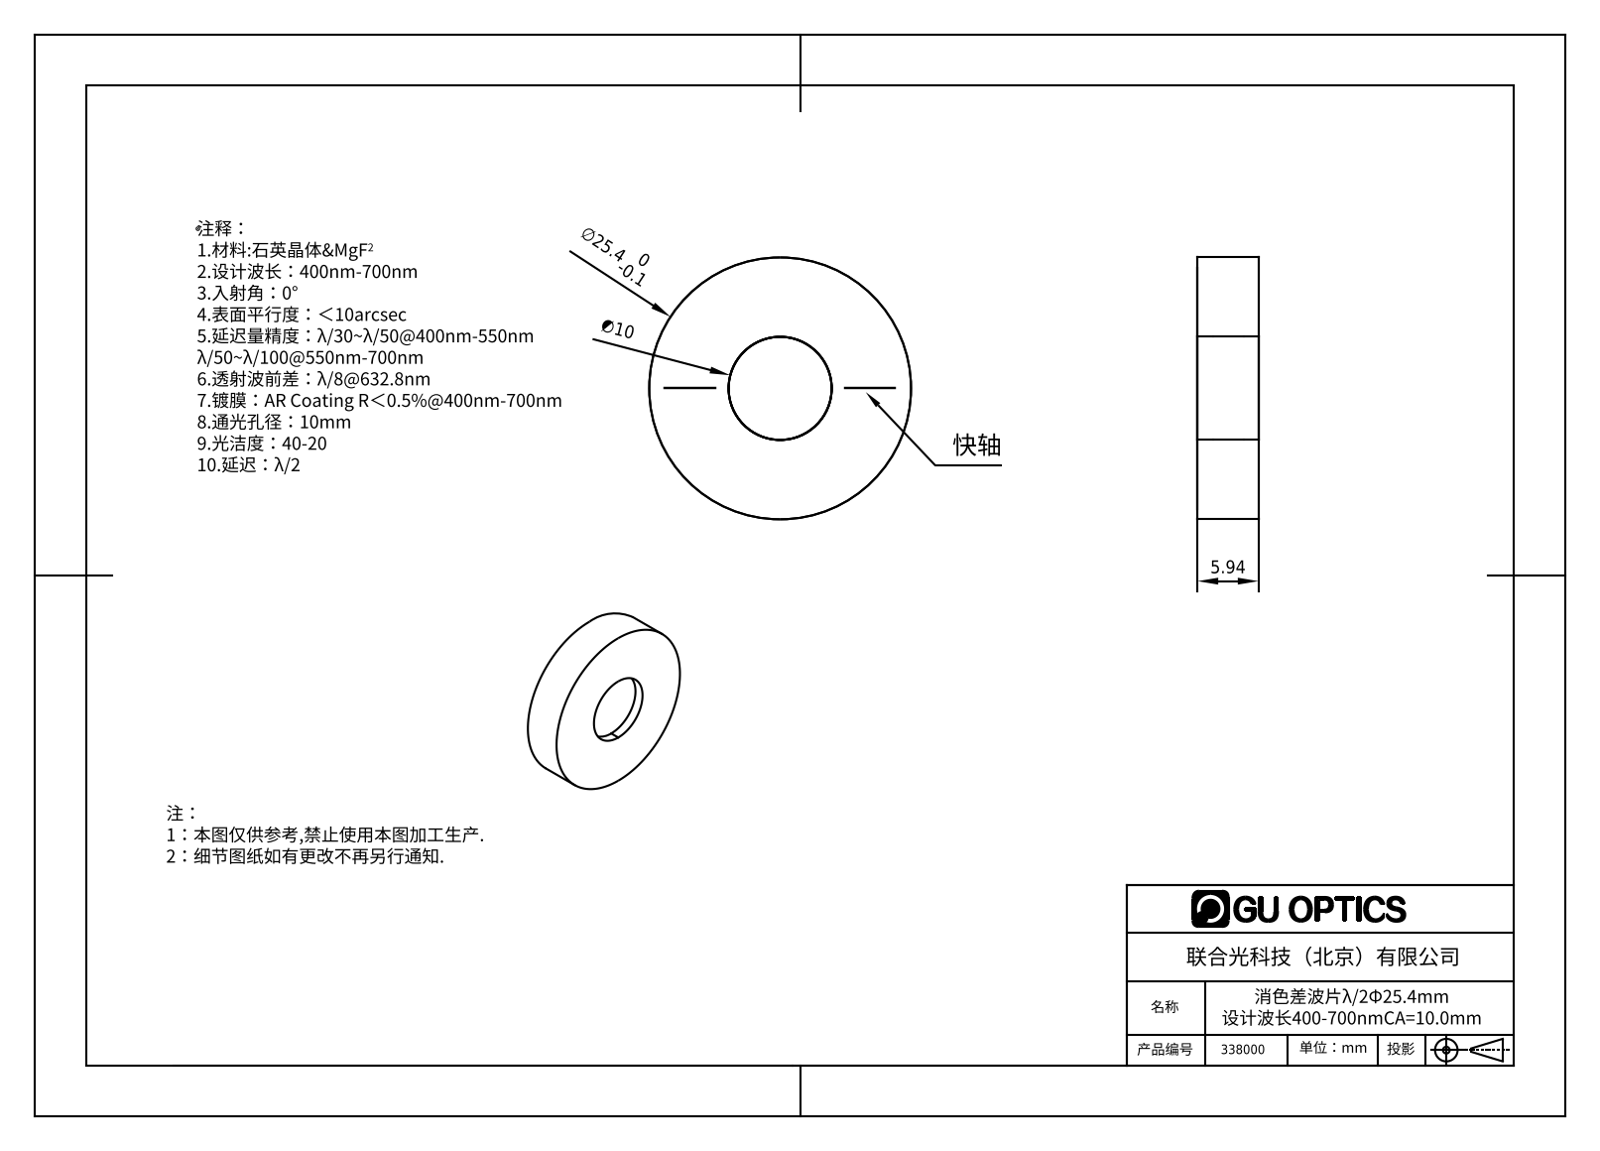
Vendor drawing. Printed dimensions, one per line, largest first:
12.70
∅10
5.94
